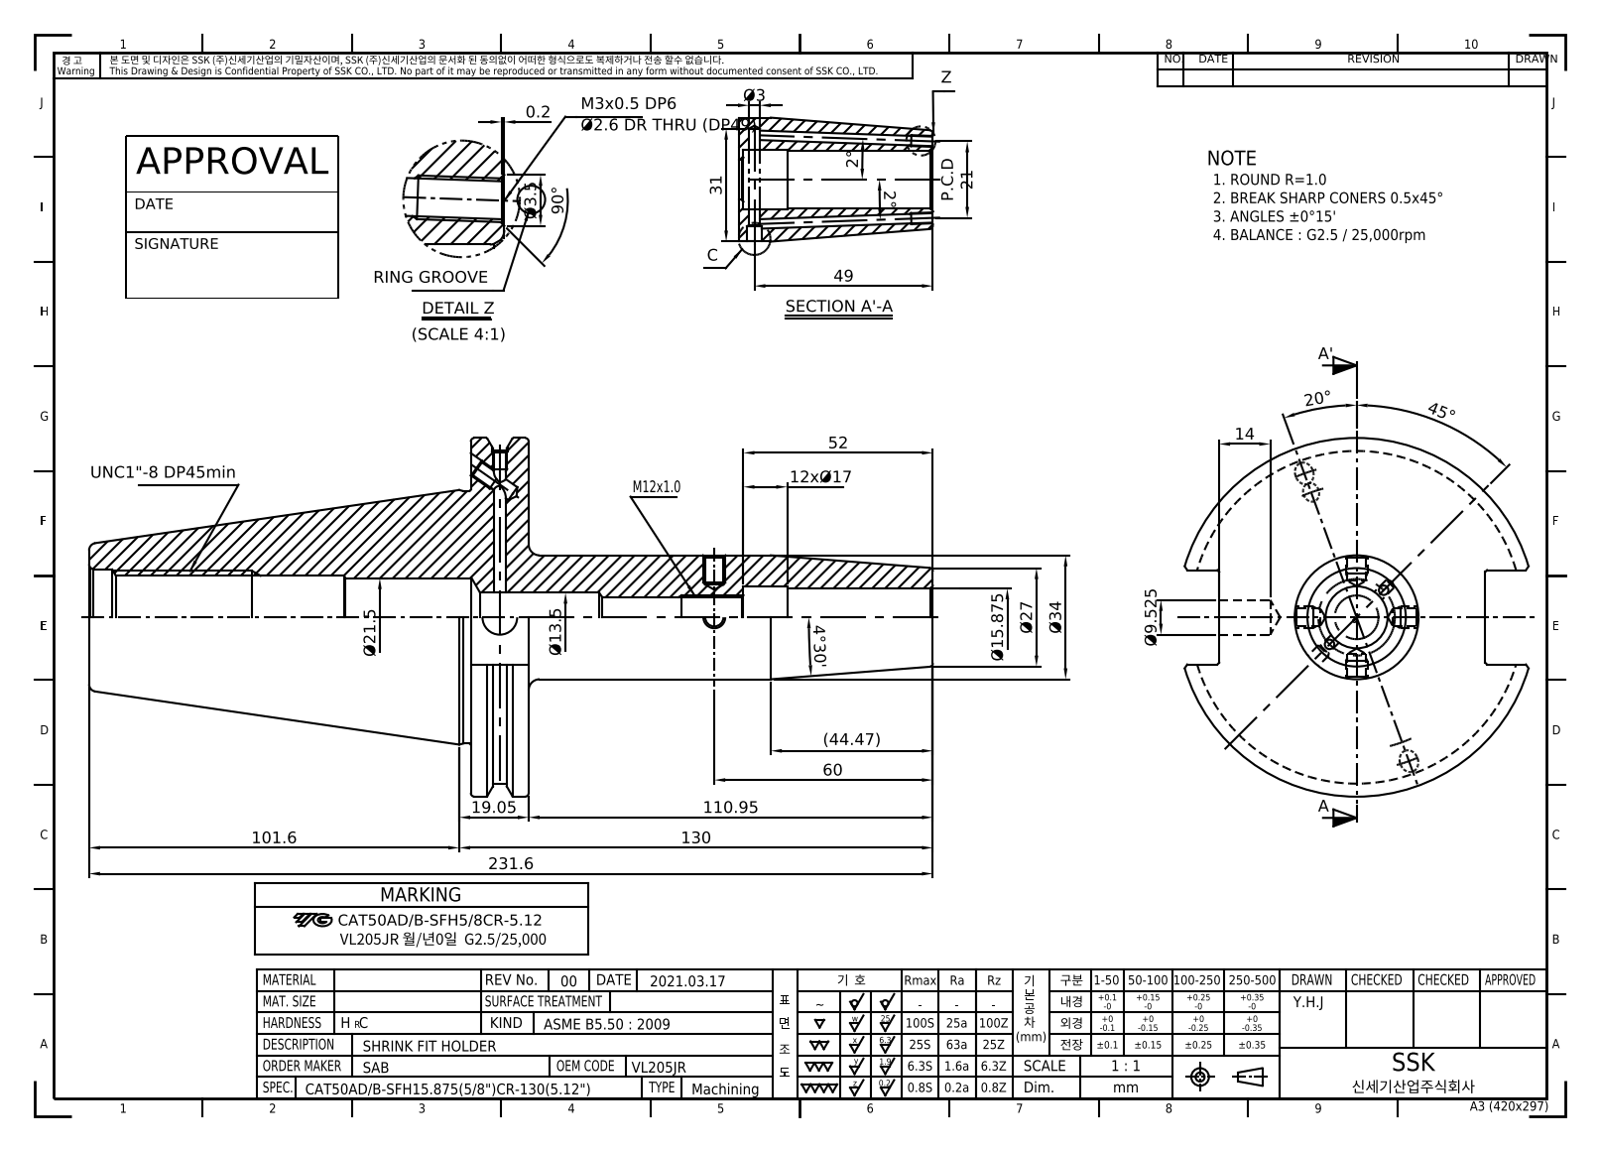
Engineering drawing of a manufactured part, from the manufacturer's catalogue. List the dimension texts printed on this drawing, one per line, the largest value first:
231.6
130
110.95
101.6
90°
60
52
49
45°
(44.47)
Ø34
31
Ø27
Ø21.5
P.C.D 21
20°
19.05
12xØ17
Ø15.875
14
Ø13.5
Ø9.525
4°30'
Ø3.5
Ø3
2°
2°
0.2
